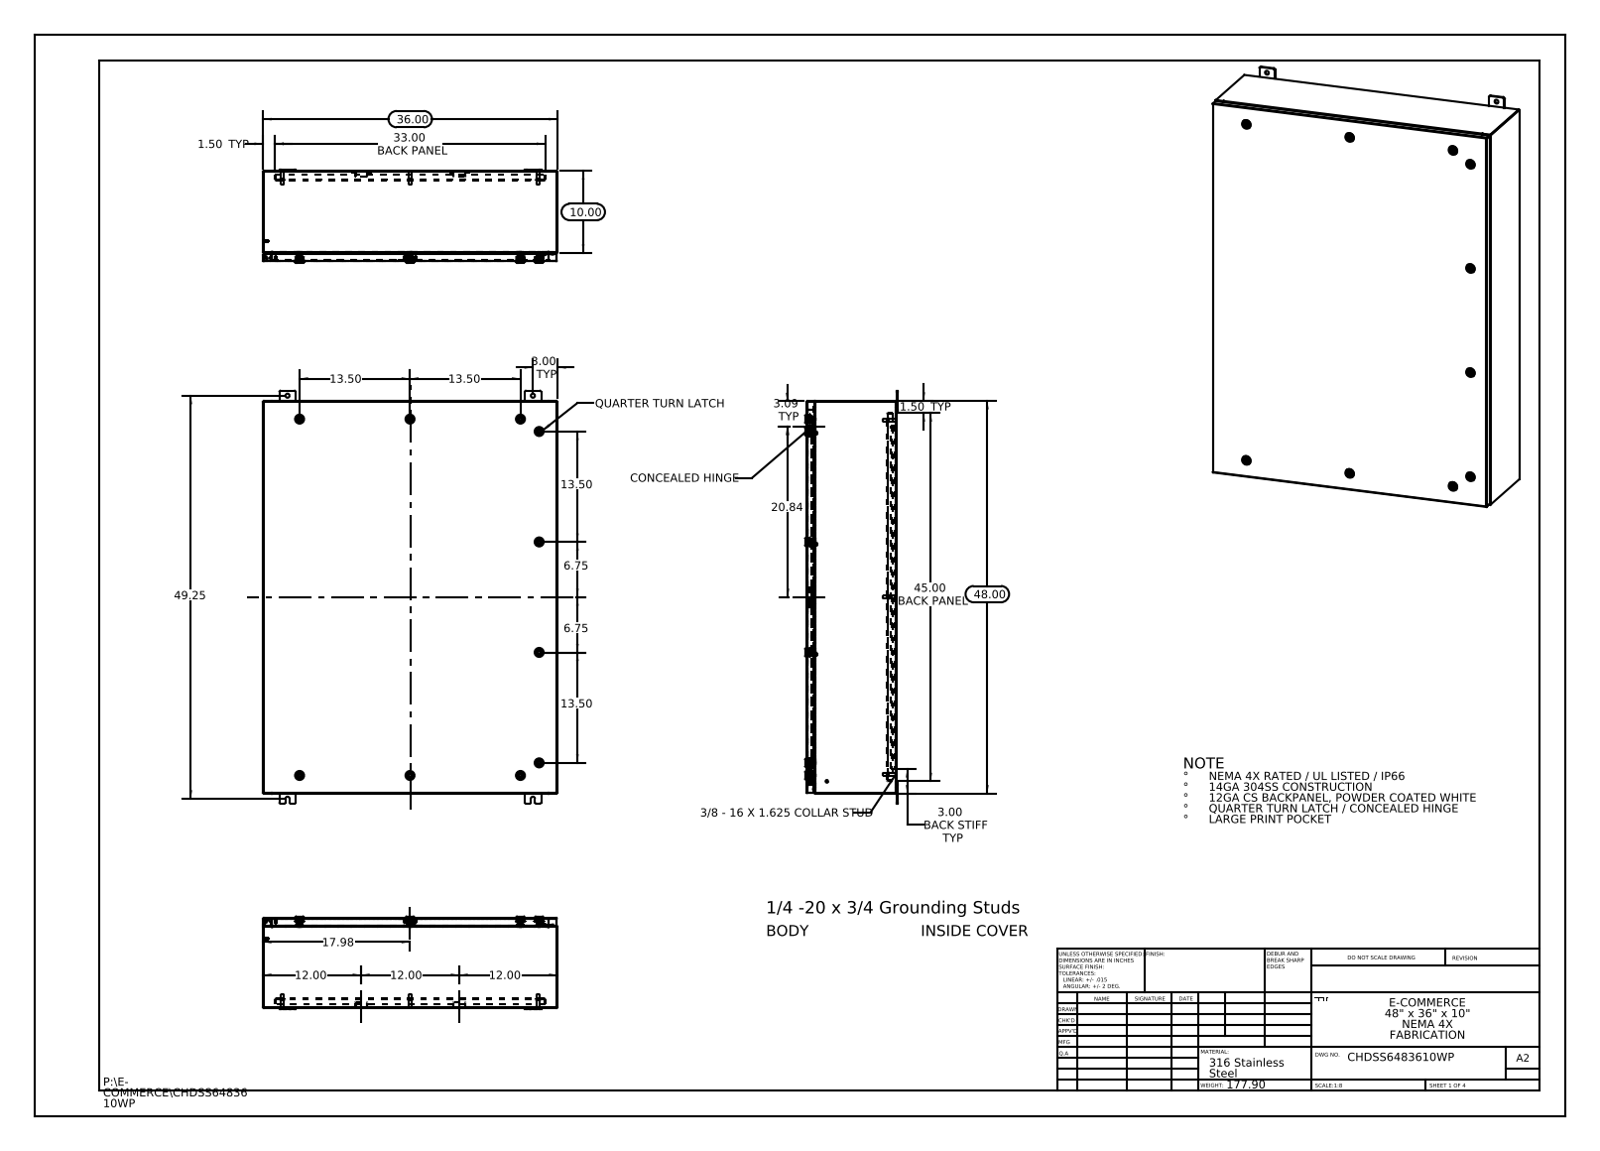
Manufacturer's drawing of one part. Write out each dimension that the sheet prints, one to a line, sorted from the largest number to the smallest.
49.25
48.00
45.00 BACK PANEL
36.00
33.00 BACK PANEL
20.84
17.98
13.50
13.50
13.50
13.50
12.00
12.00
12.00
10.00
6.75
6.75
3.09 TYP
3.00 TYP
3.00 BACK STIFF TYP
1.50 TYP
1.50 TYP
